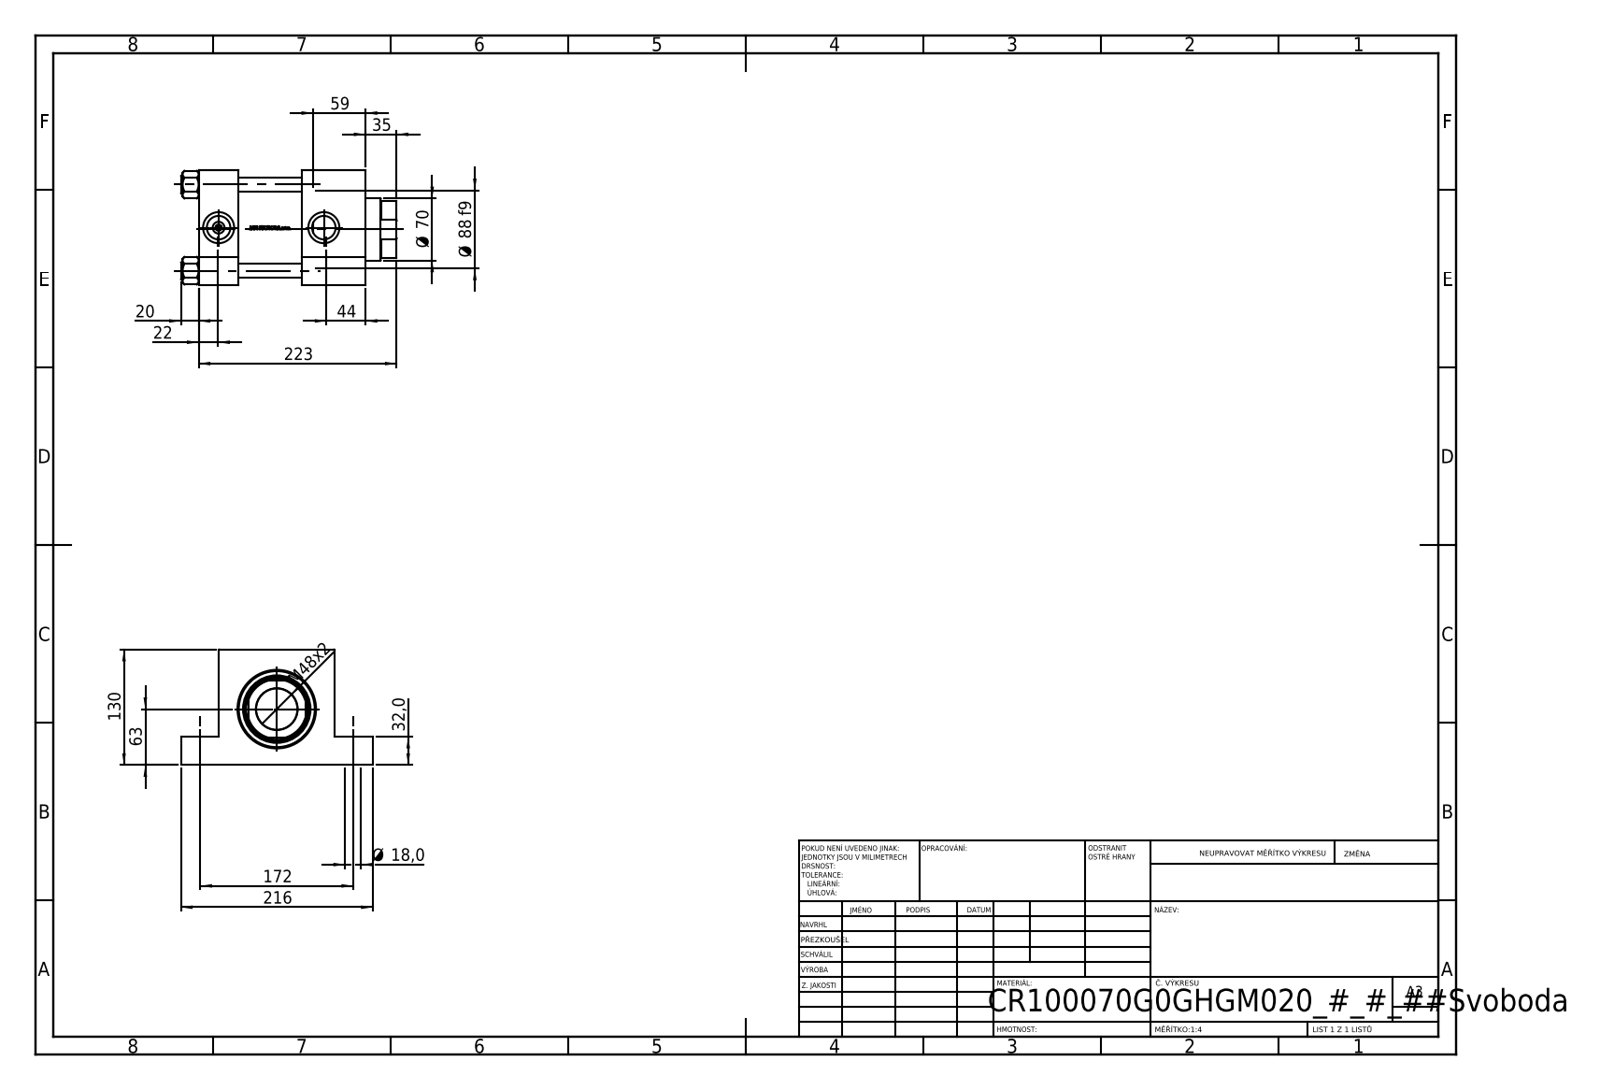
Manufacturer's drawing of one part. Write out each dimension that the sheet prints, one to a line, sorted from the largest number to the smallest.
223
216
172
130
Ø 88 f9
Ø 70
63
59
M48x2
44
35
32,0
22
20
Ø 18,0
